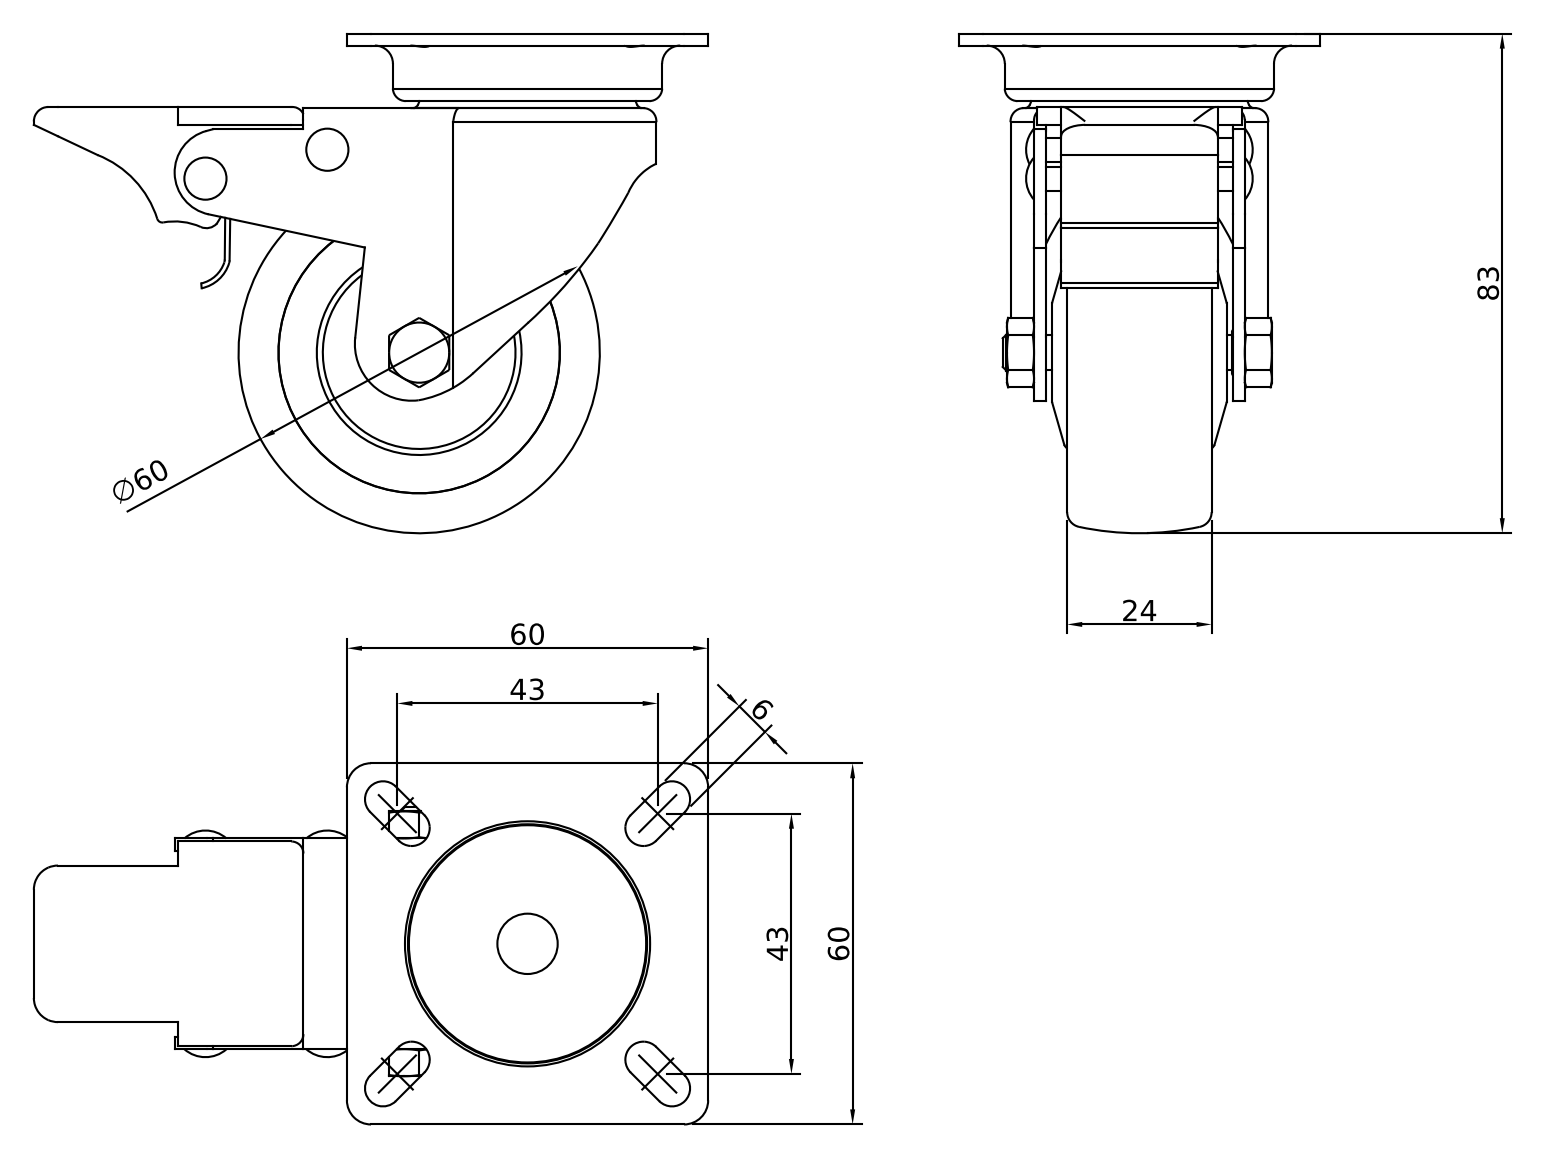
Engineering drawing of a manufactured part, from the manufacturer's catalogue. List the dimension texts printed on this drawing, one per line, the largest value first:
83
∅60
60
60
43
43
24
6
